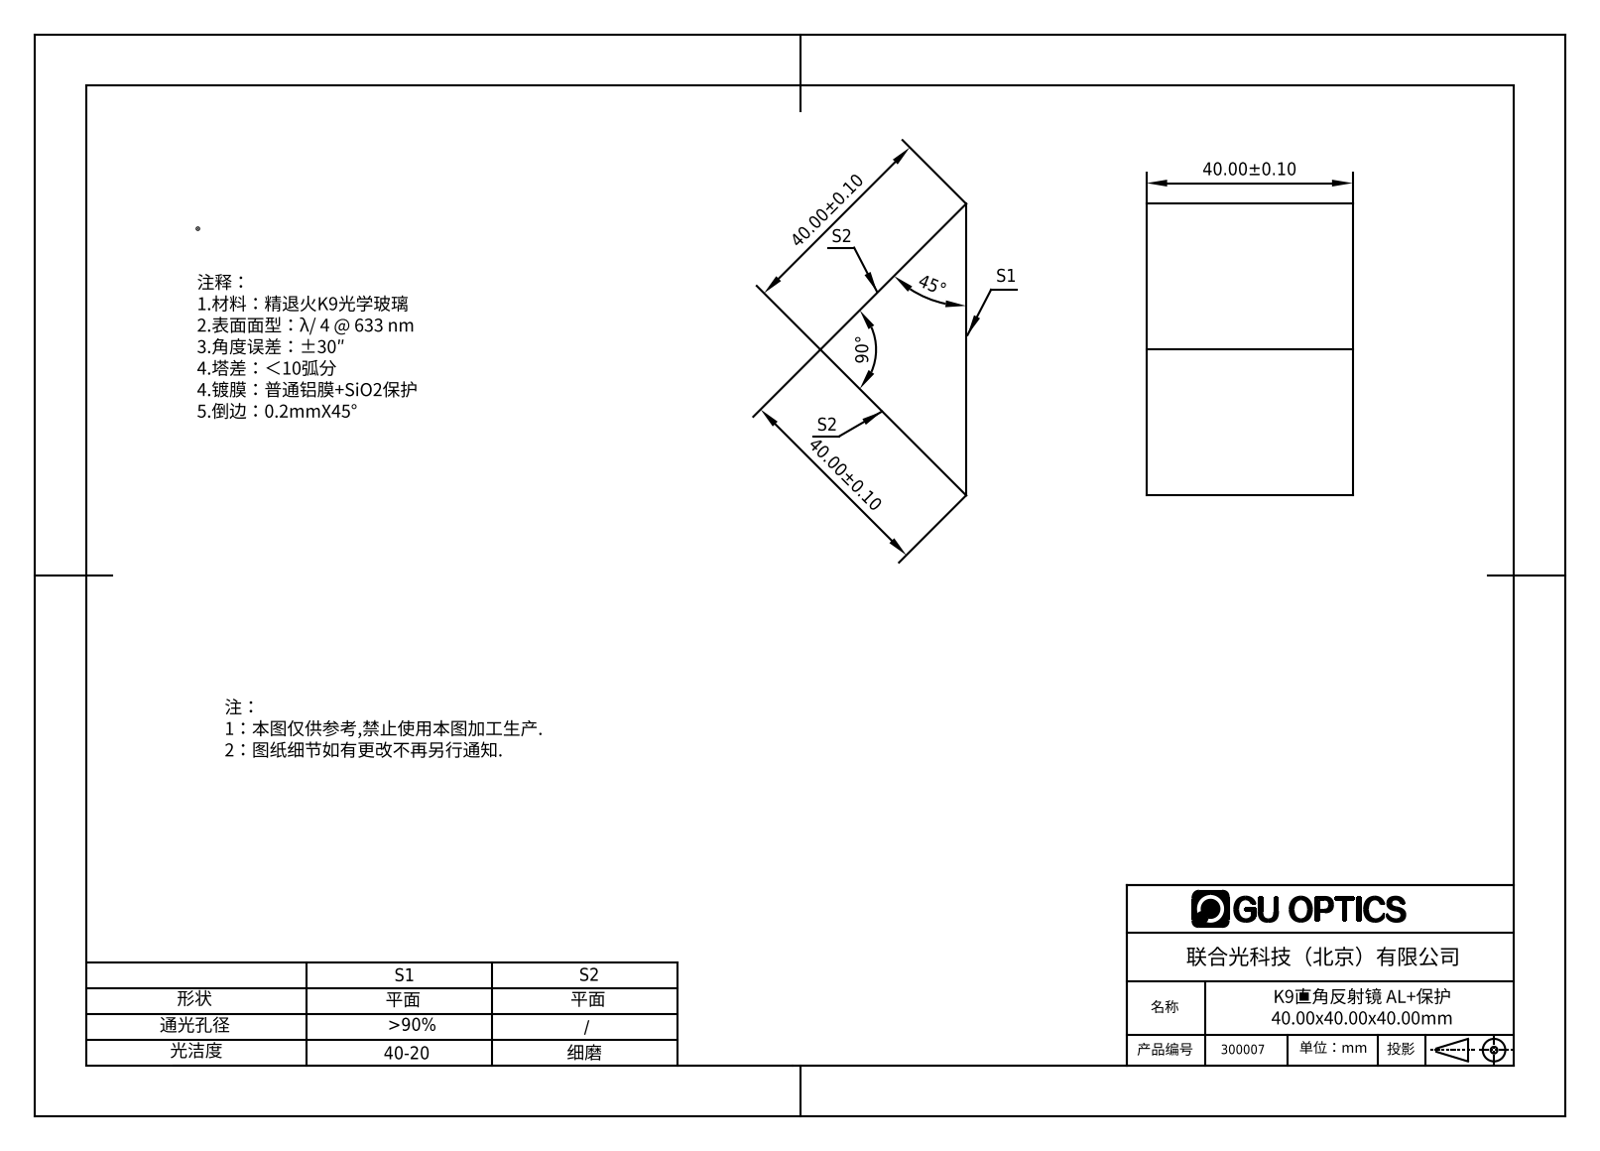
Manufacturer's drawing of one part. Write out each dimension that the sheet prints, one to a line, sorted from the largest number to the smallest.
90°
45°
40.00±0.10
40.00±0.10
40.00±0.10
